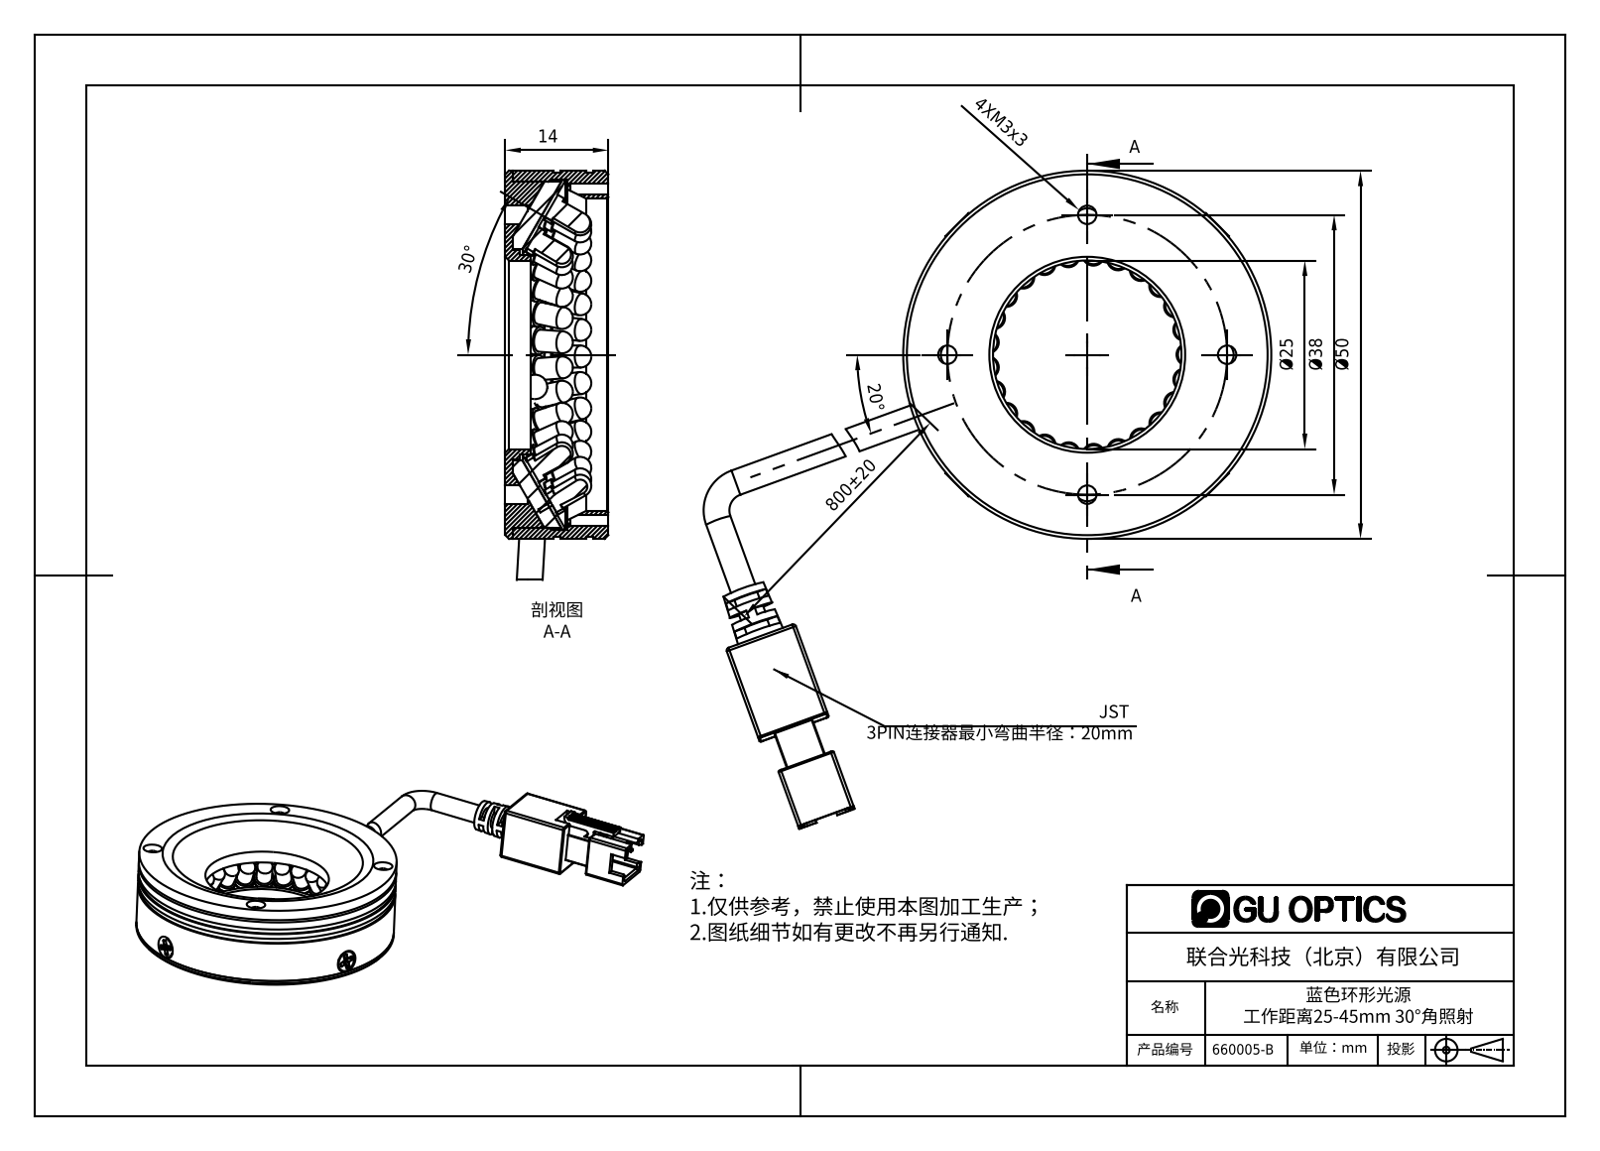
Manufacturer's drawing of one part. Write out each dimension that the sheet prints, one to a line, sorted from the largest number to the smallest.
800±20
Ø50
Ø38
30°
Ø25
20°
14
4XM3x3
